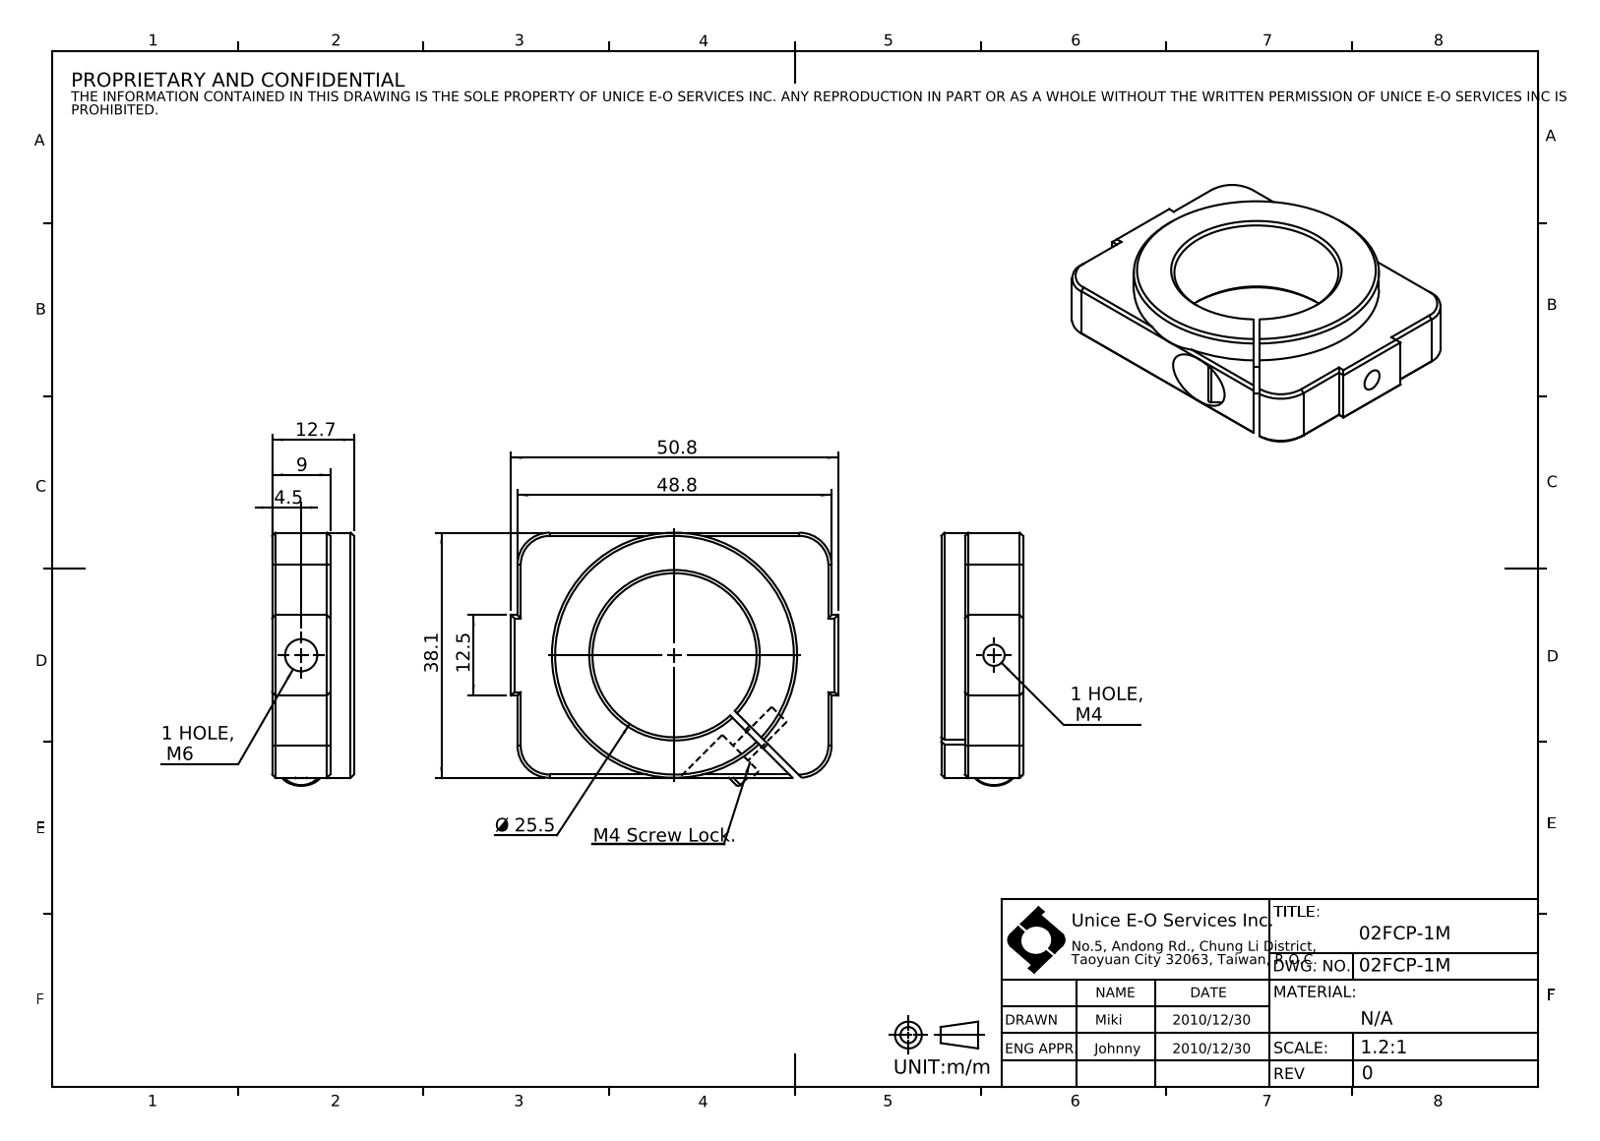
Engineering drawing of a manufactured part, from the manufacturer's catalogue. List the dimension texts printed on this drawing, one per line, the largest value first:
50.8
48.8
38.1
Ø 25.5
12.7
12.5
9
4.5
1 HOLE, M6
1 HOLE, M4
